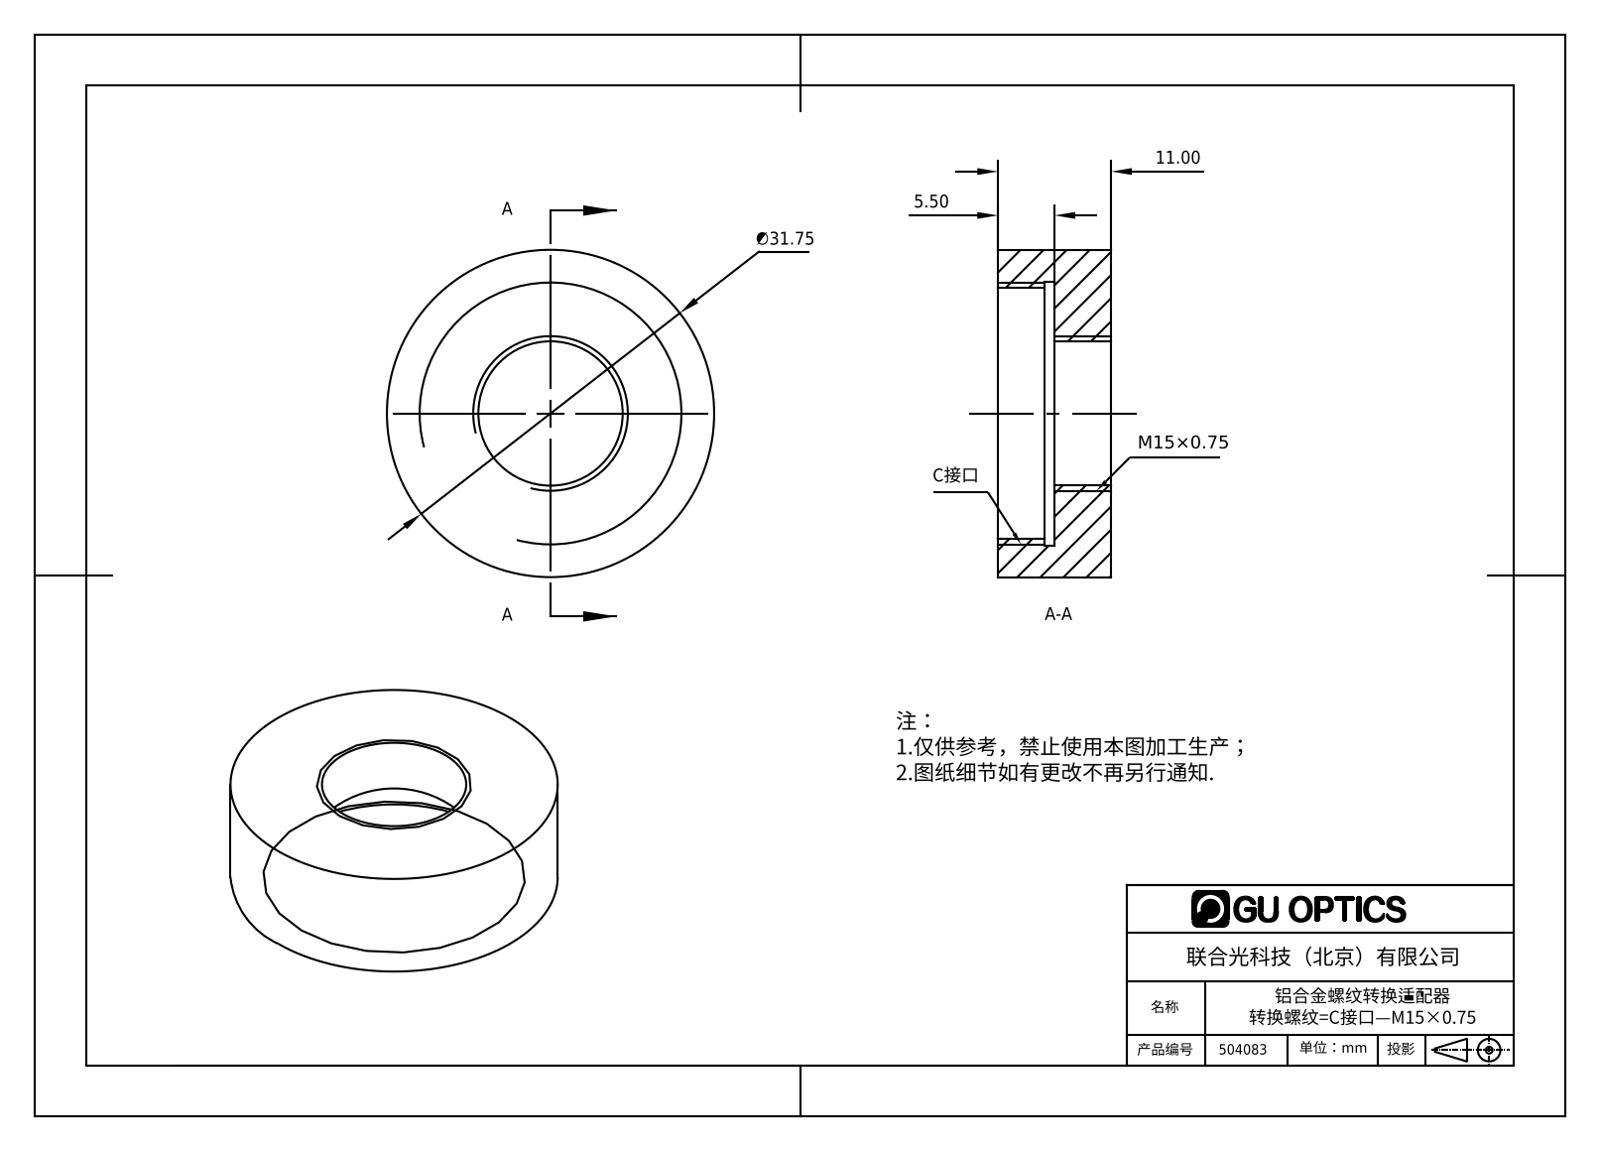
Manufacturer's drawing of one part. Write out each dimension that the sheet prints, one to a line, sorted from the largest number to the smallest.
∅31.75
11.00
5.50
